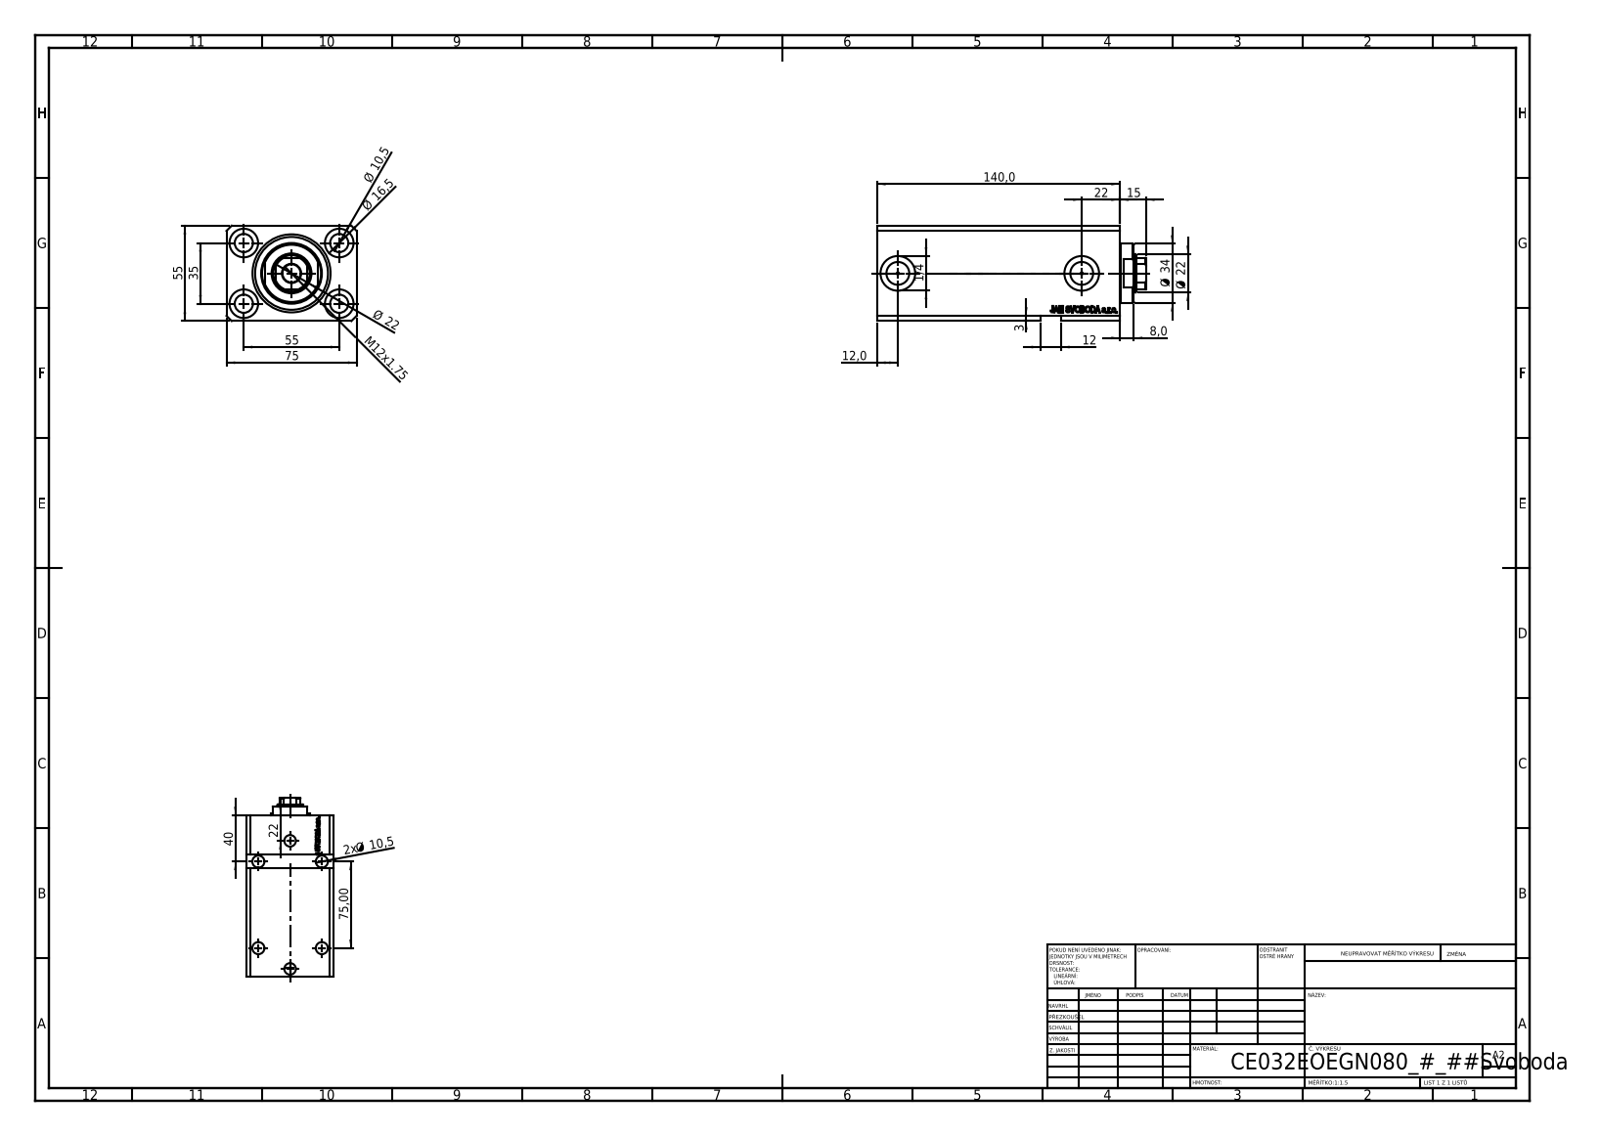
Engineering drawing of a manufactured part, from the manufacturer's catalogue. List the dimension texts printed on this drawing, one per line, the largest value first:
140,0
75
75,00
55
55
40
35
Ø 34
Ø 22
22
Ø 22
22
Ø 16,5
15
M12x1.75
12,0
12
Ø 10,5
2x Ø 10,5
8,0
3
1/4
